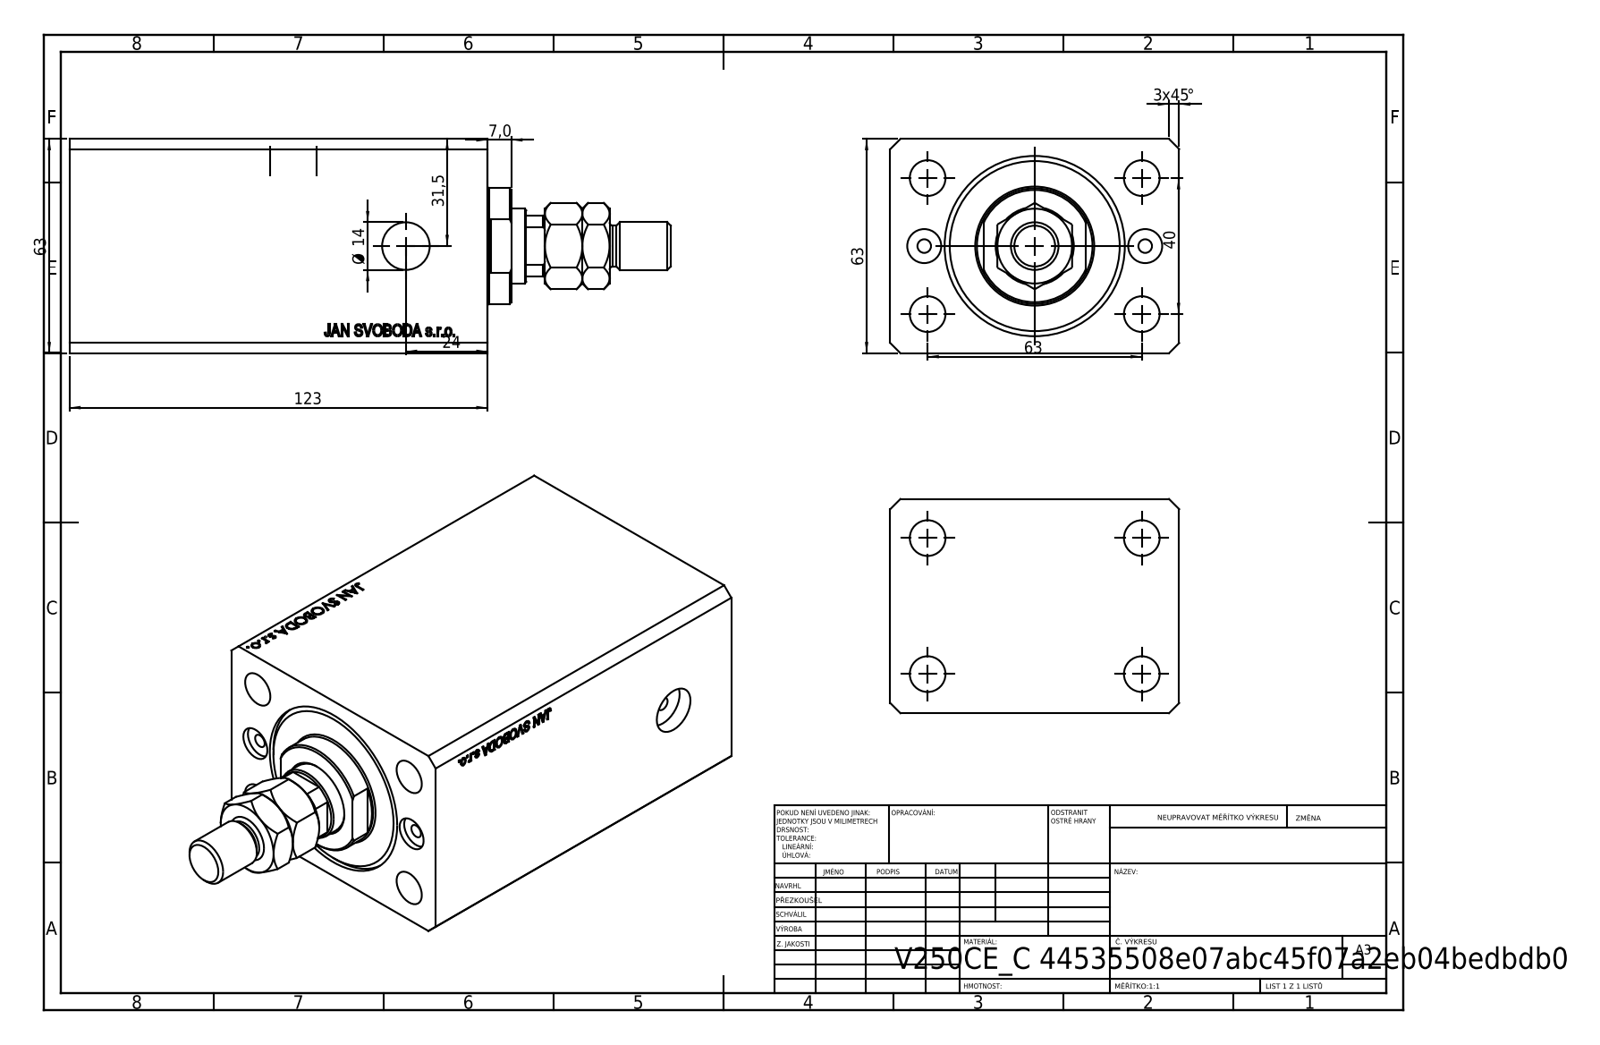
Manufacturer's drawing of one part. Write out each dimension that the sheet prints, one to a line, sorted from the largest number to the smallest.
123
63
63
63
3 x45 °
40
31,5
24
Ø 14
7,0
